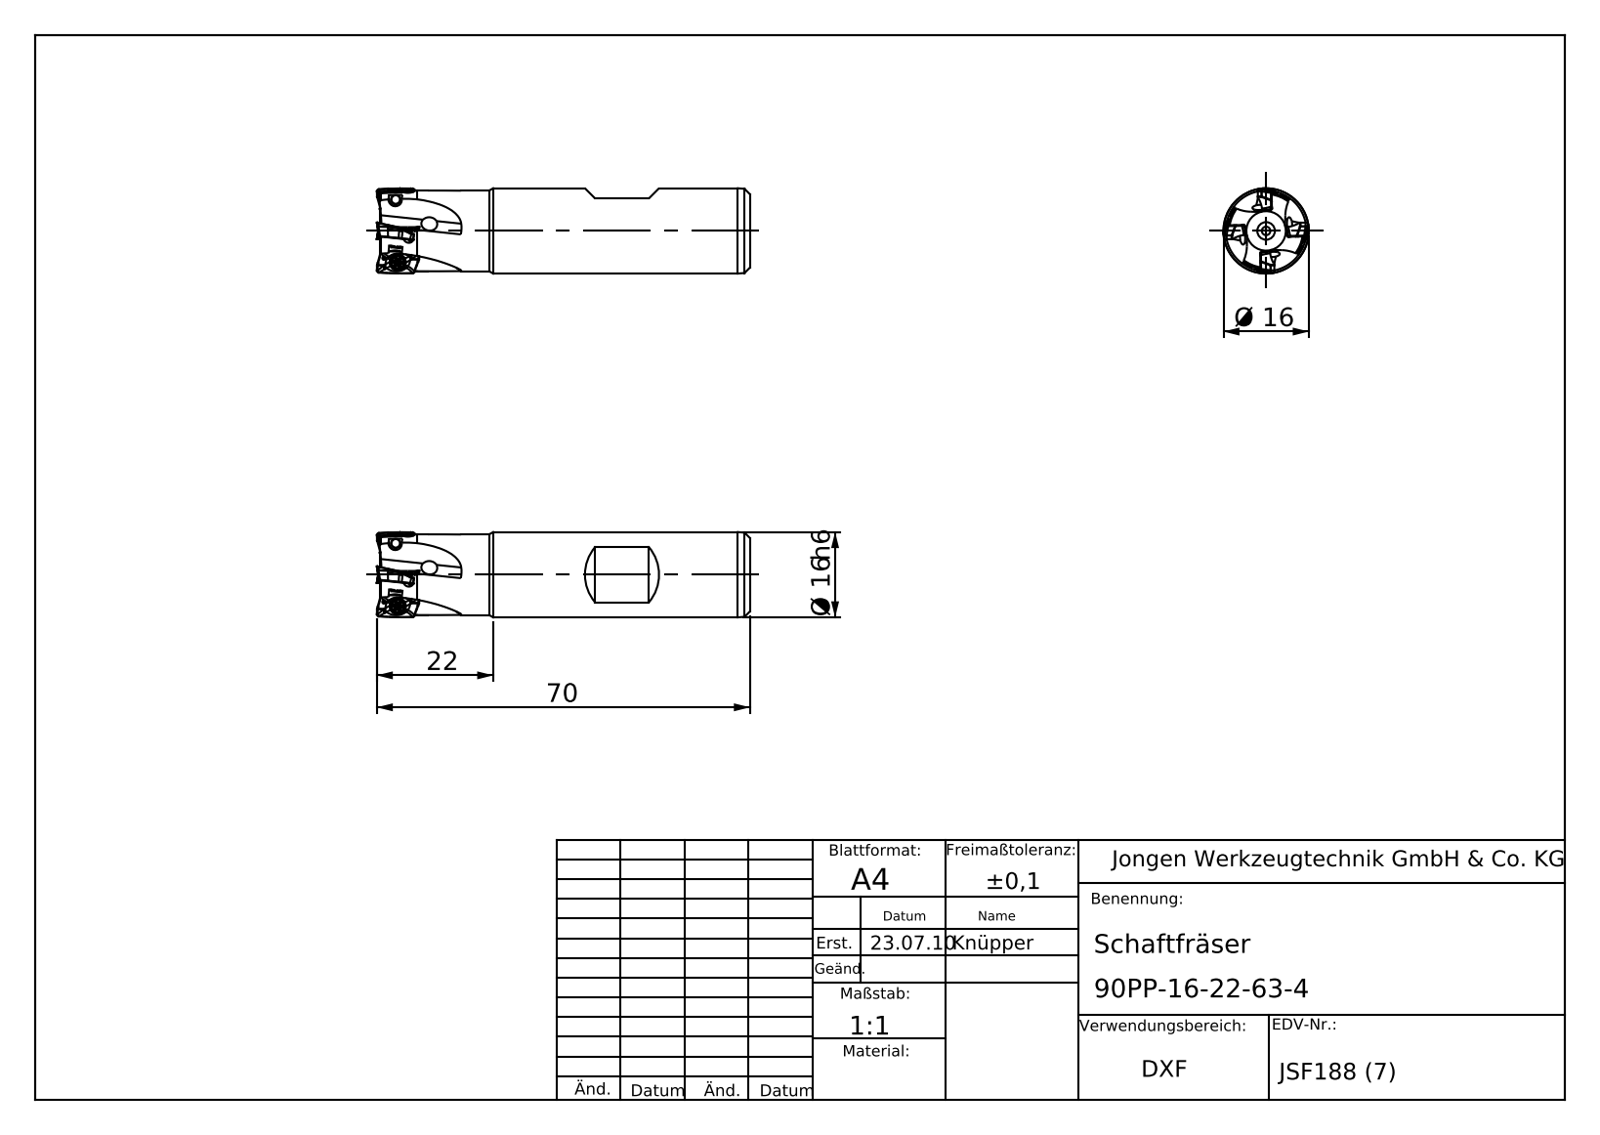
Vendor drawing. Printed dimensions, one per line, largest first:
70
22
Ø 16
Ø 16 h6
